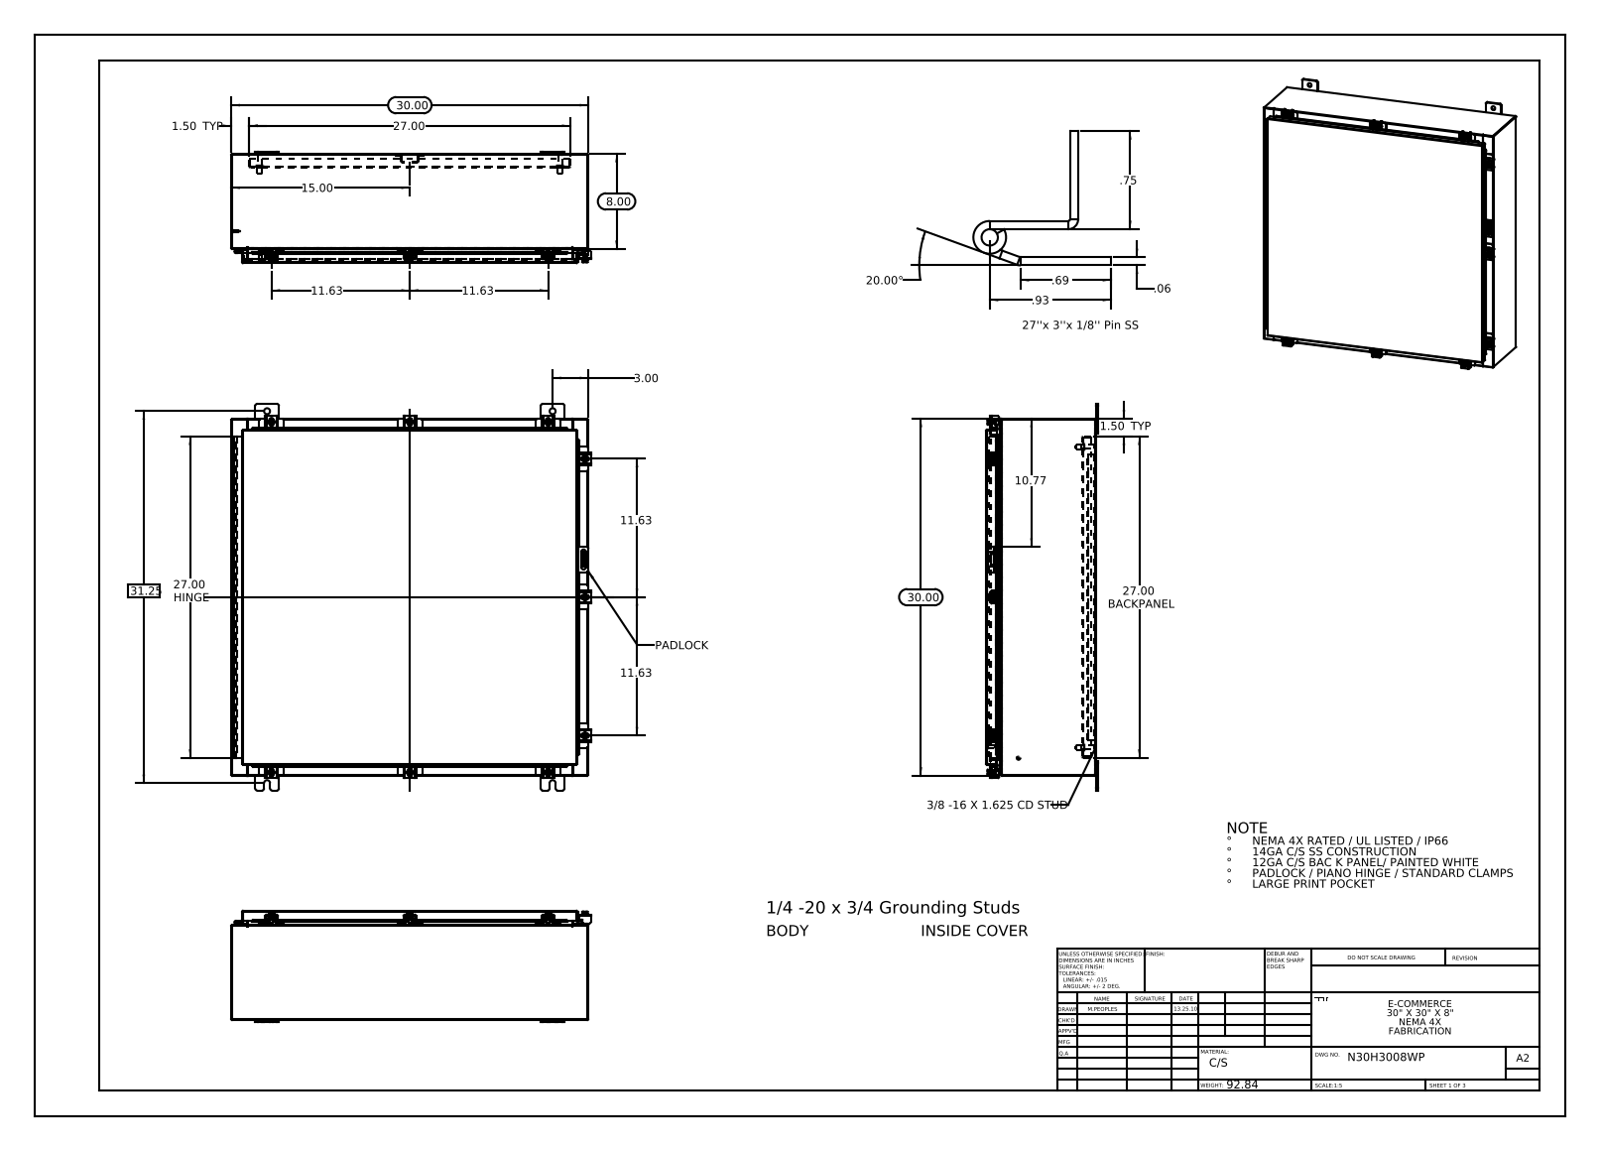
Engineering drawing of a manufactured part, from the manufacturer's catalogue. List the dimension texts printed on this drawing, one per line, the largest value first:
31.25
30.00
30.00
27.00 HINGE
27.00
27.00 BACKPANEL
20.00°
15.00
11.63
11.63
11.63
11.63
10.77
8.00
3.00
1.50 TYP
1.50 TYP
.93
.75
.69
.06
